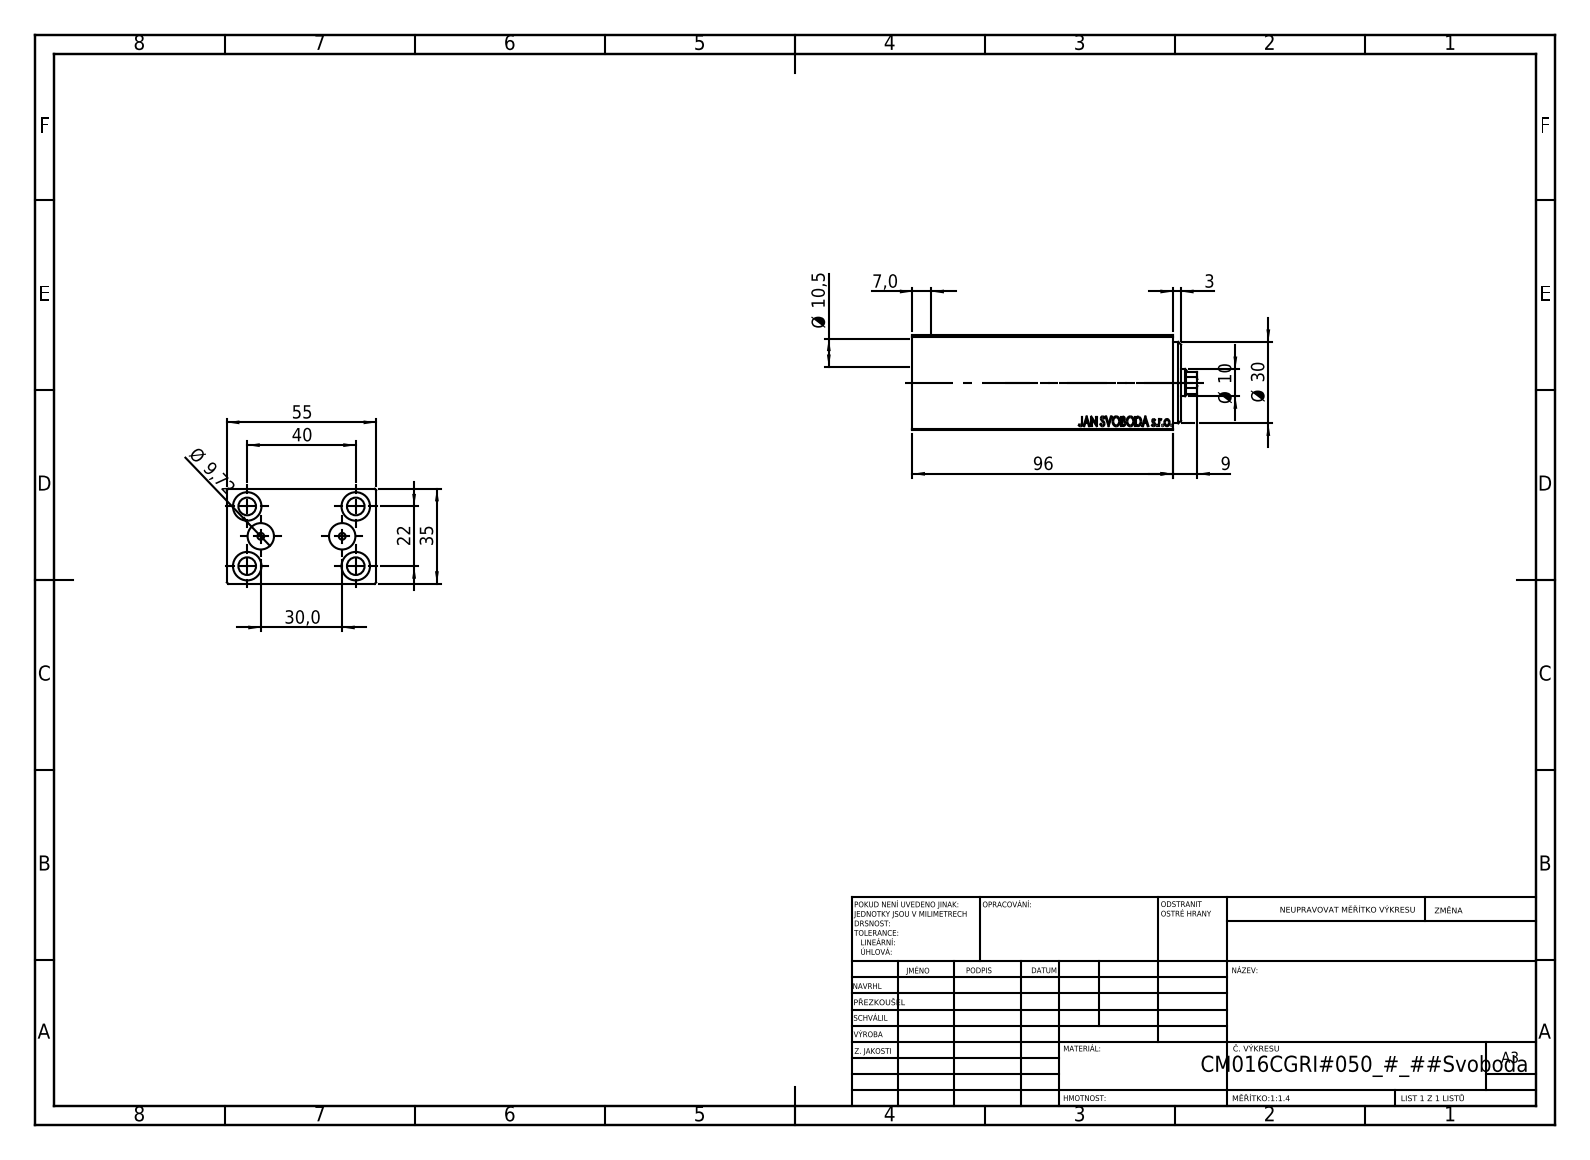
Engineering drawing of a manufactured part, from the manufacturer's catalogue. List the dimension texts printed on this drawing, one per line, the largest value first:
96
55
40
35
Ø 30
30,0
22
Ø 10,5
Ø 10
Ø 9,72
9
7,0
3
